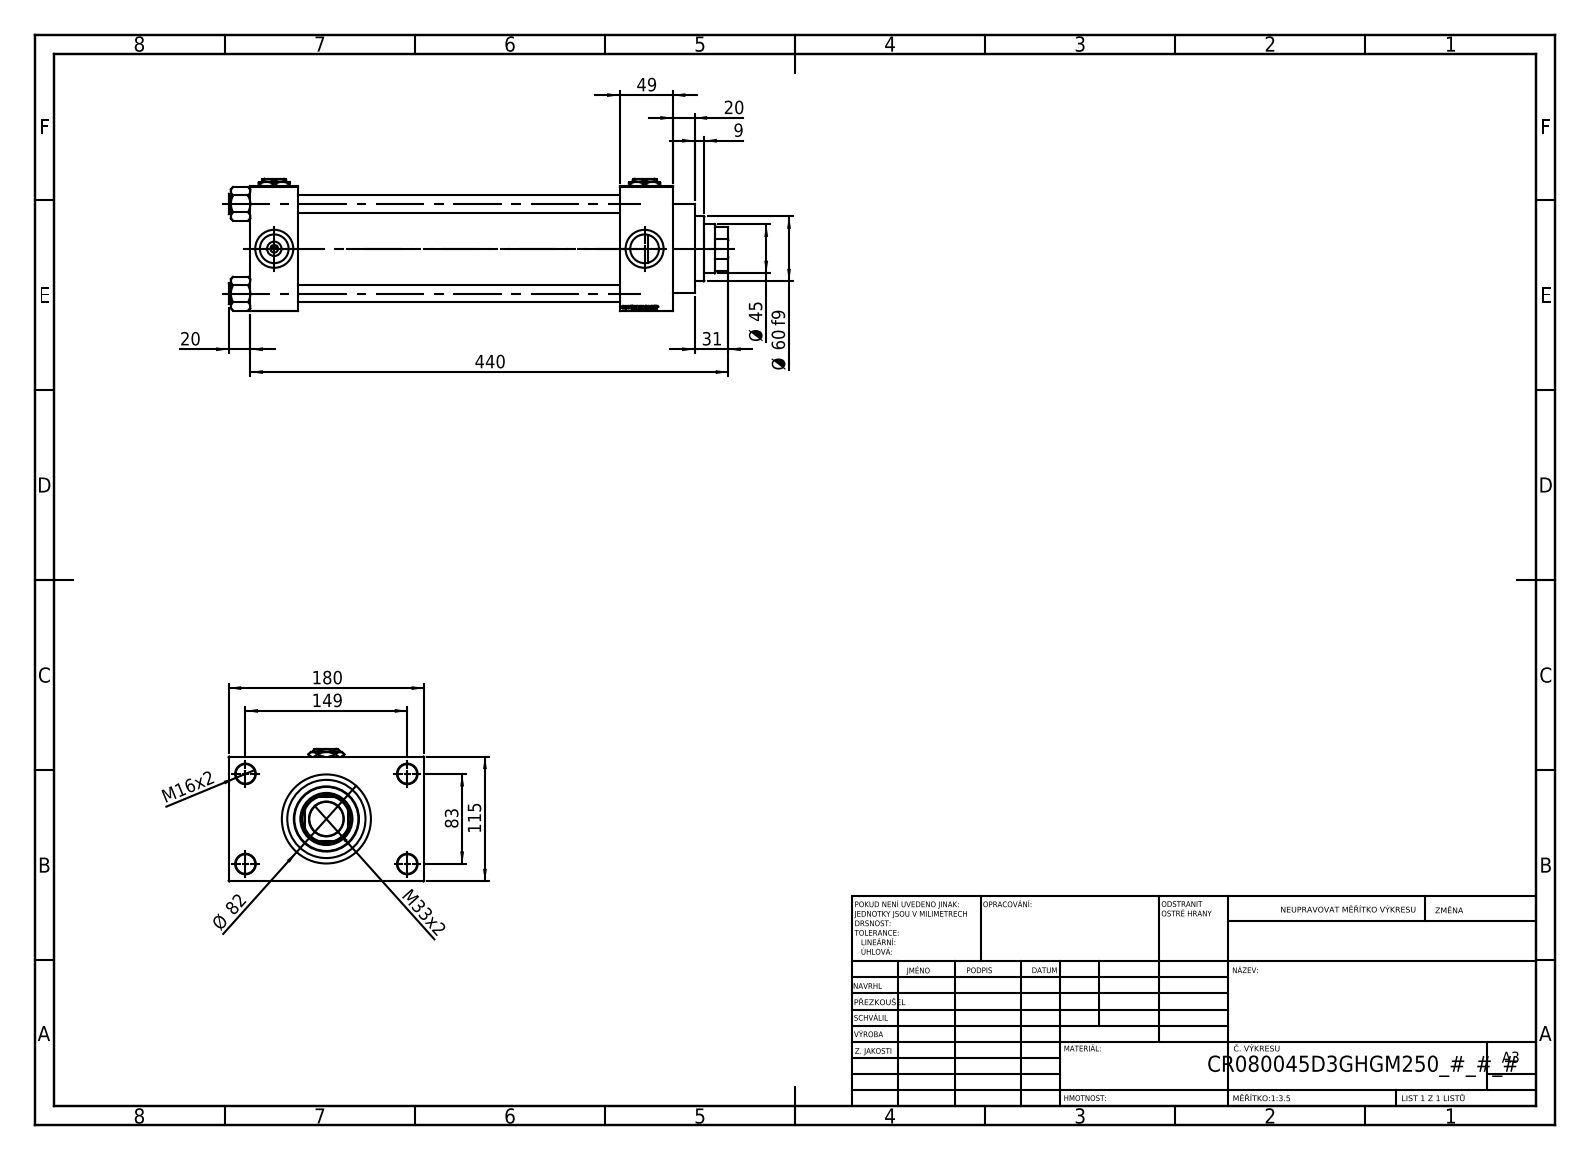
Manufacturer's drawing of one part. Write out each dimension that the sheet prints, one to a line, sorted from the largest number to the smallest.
440
180
149
115
83
Ø 82
Ø 60 f9
49
Ø 45
M33x2
31
20
20
M16x2
9
